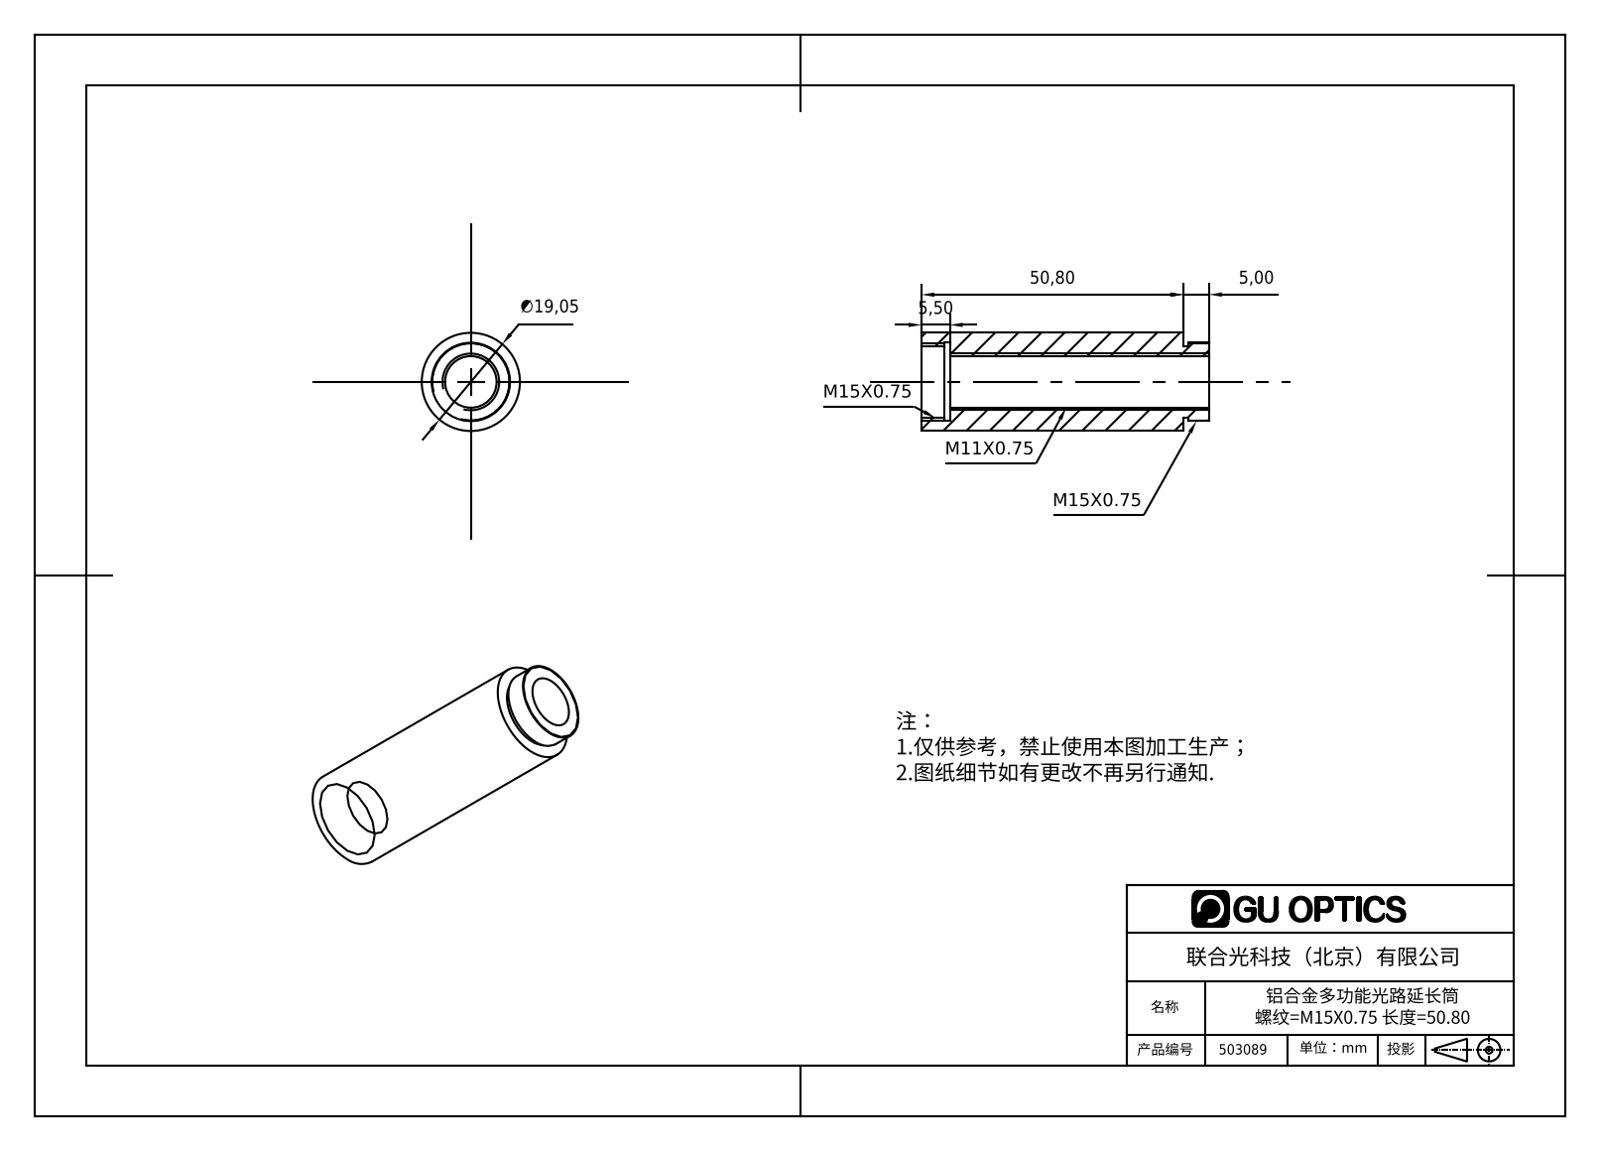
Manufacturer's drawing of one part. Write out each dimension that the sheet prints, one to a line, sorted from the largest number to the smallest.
50,80
∅19,05
5,50
5,00
